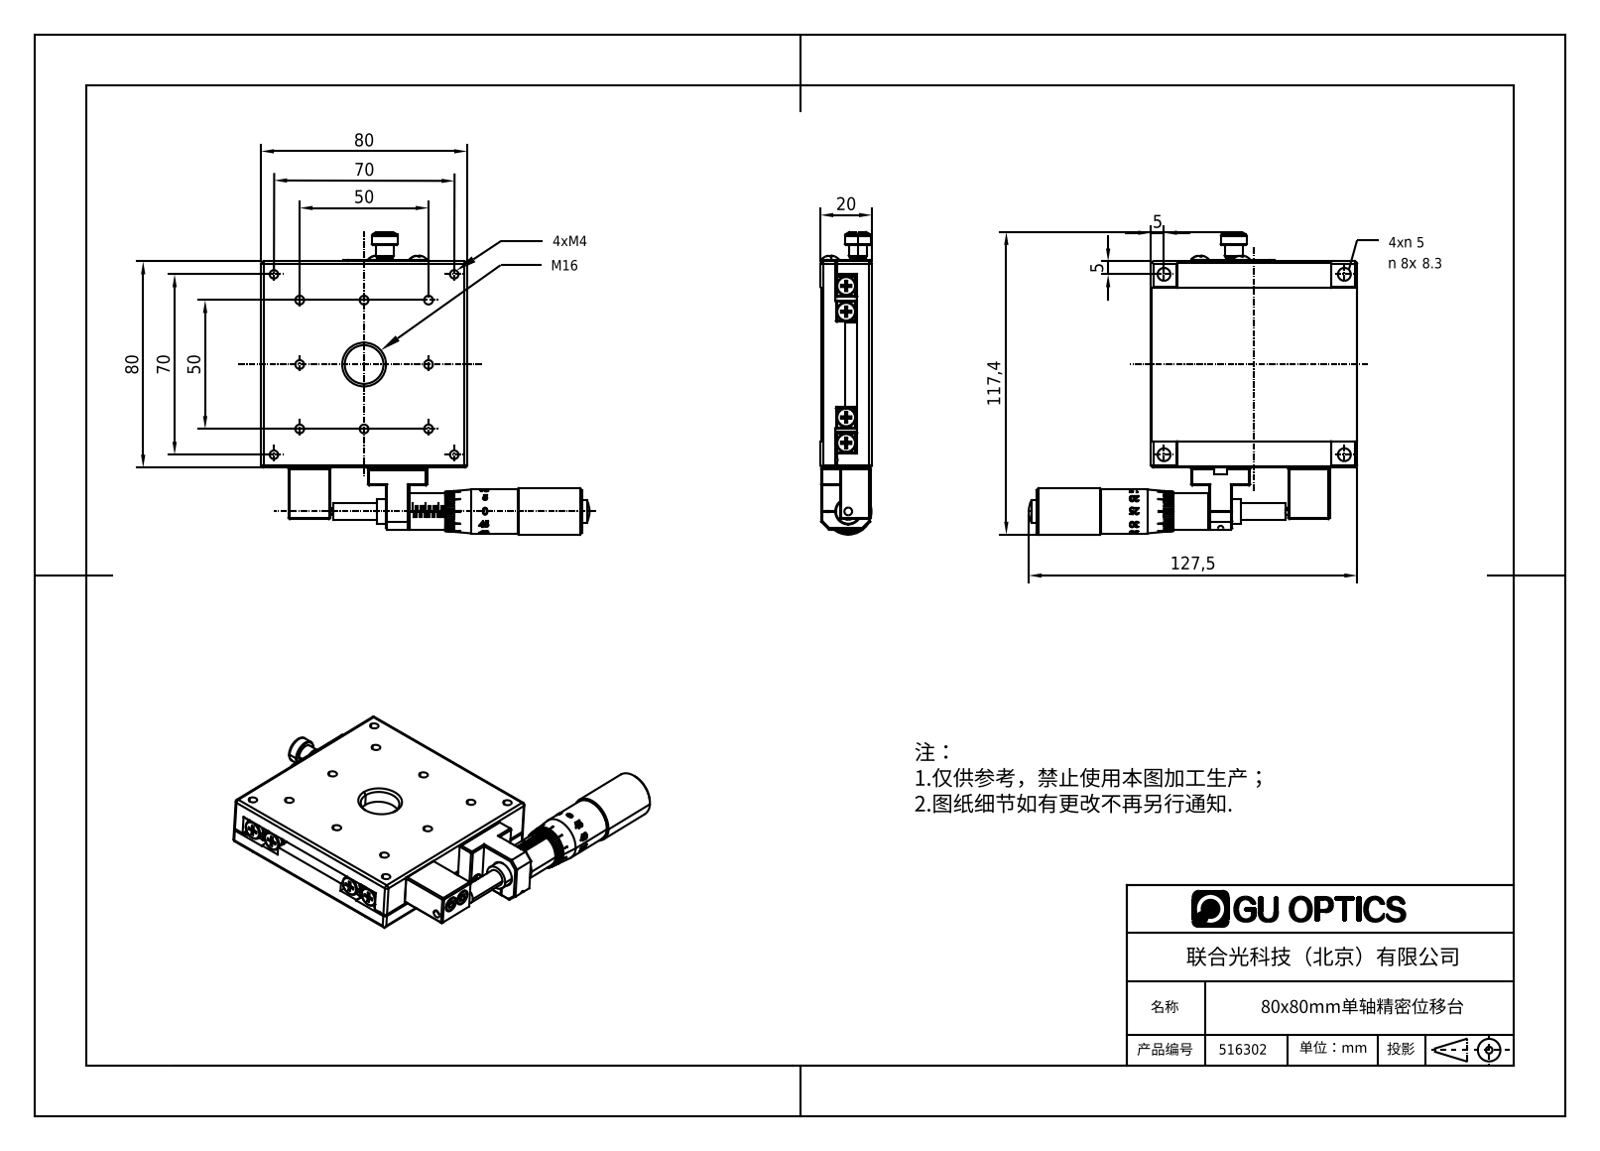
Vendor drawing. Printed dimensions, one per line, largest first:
127,5
117,4
80
80
70
70
50
50
20
5
5
